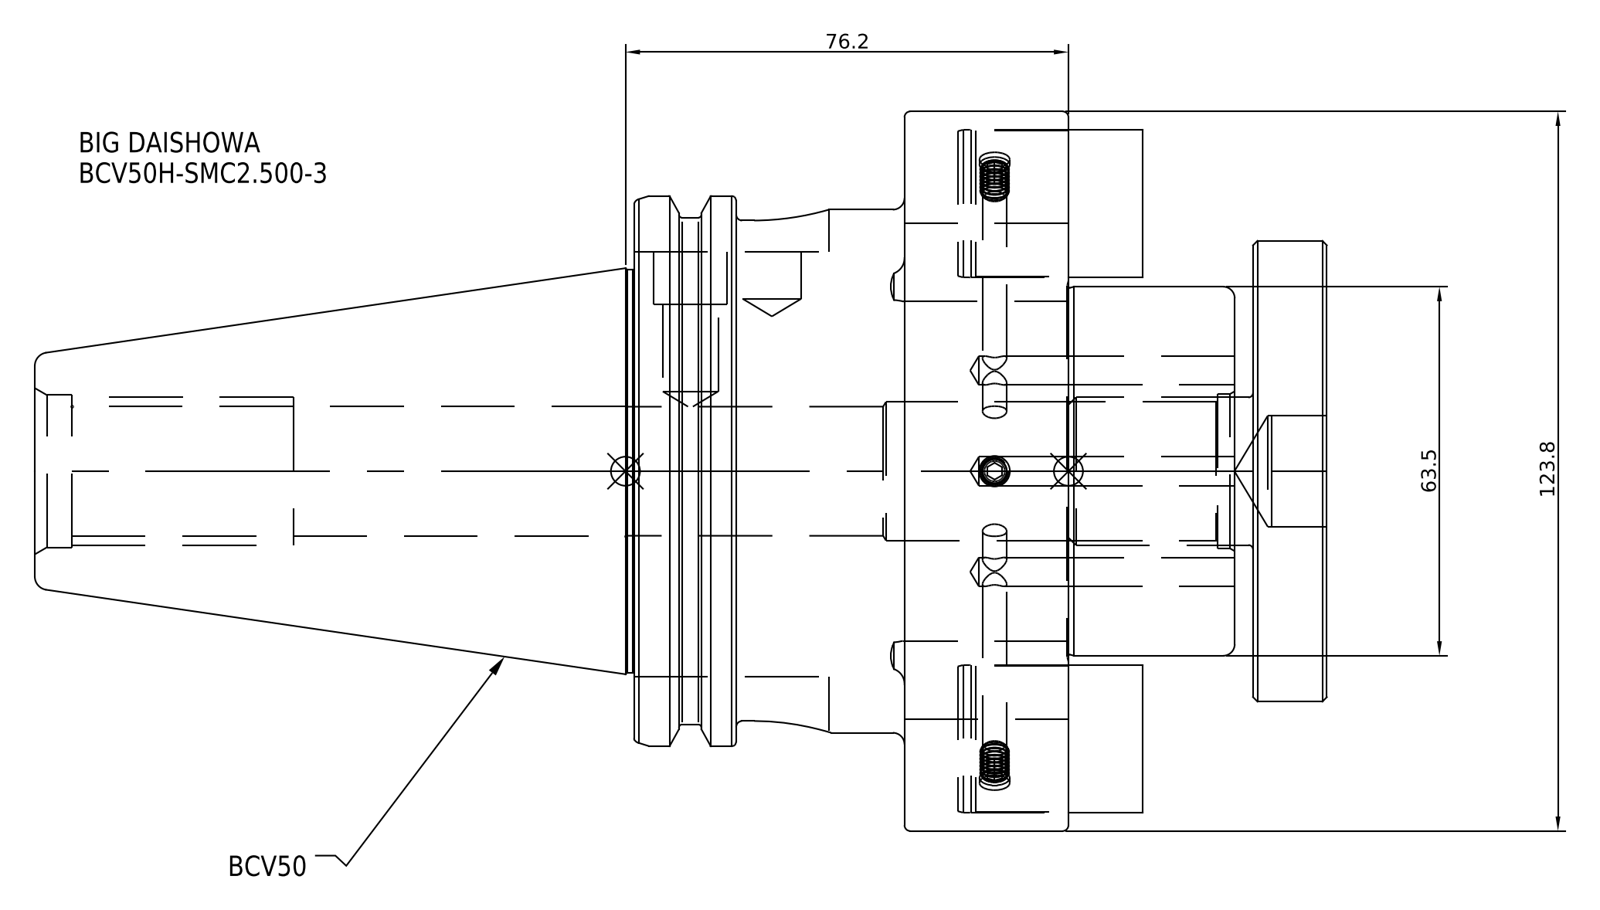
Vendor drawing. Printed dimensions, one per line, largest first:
123.8
76.2
63.5
